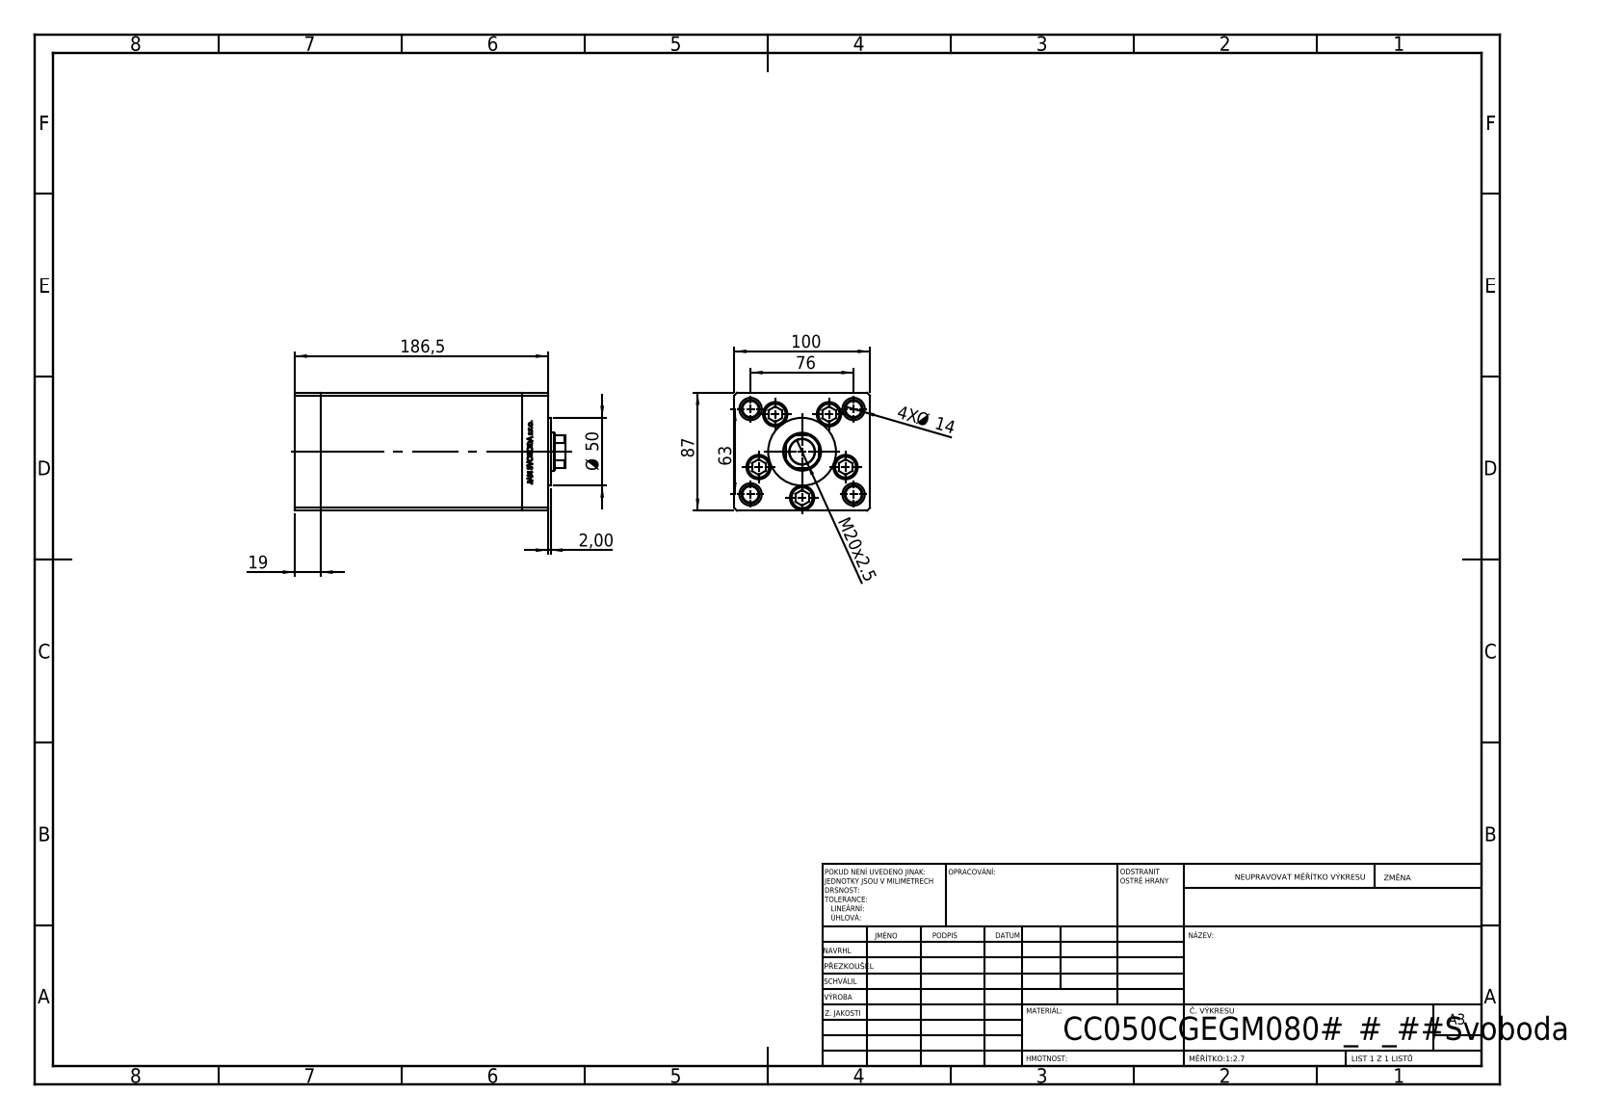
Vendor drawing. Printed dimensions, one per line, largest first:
186,5
100
87
76
63
Ø 50
M20x2.5
19
4X Ø 14
2,00
